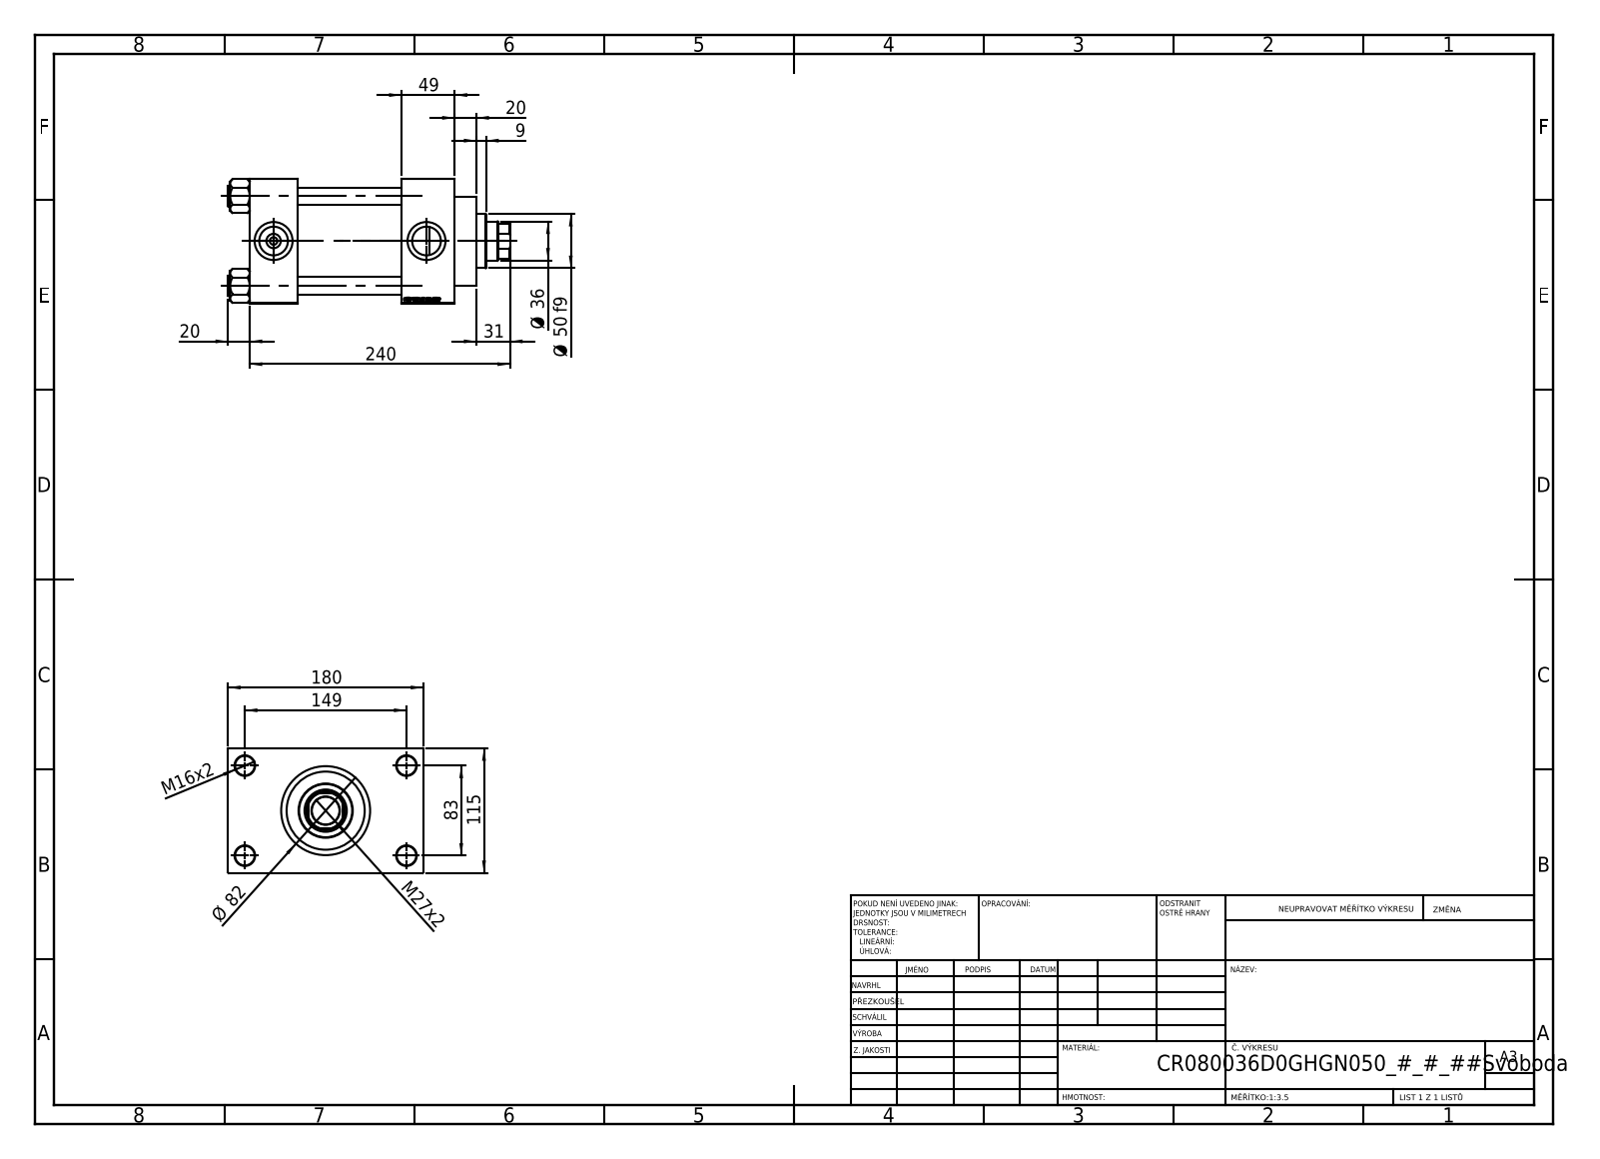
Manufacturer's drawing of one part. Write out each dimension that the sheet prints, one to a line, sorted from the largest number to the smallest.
240
180
149
115
83
Ø 82
Ø 50 f9
49
Ø 36
31
M27x2
20
20
M16x2
9
